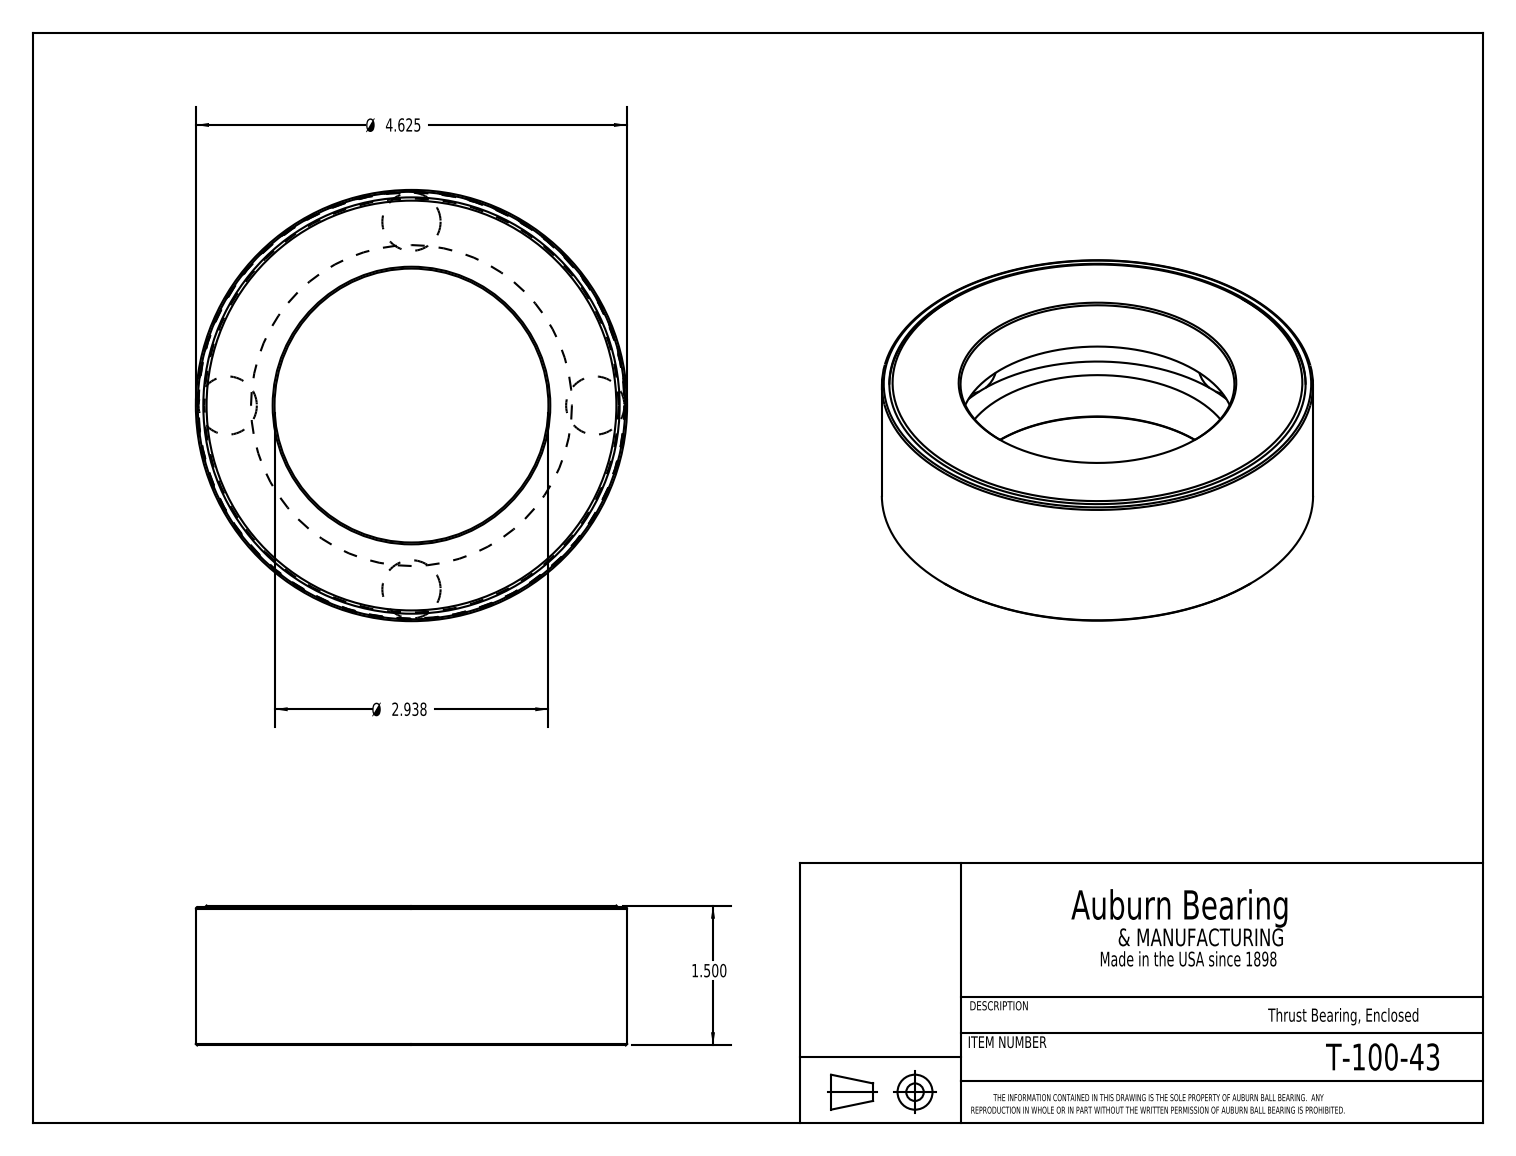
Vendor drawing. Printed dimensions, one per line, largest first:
Ø 4.625
Ø 2.938
1.500
